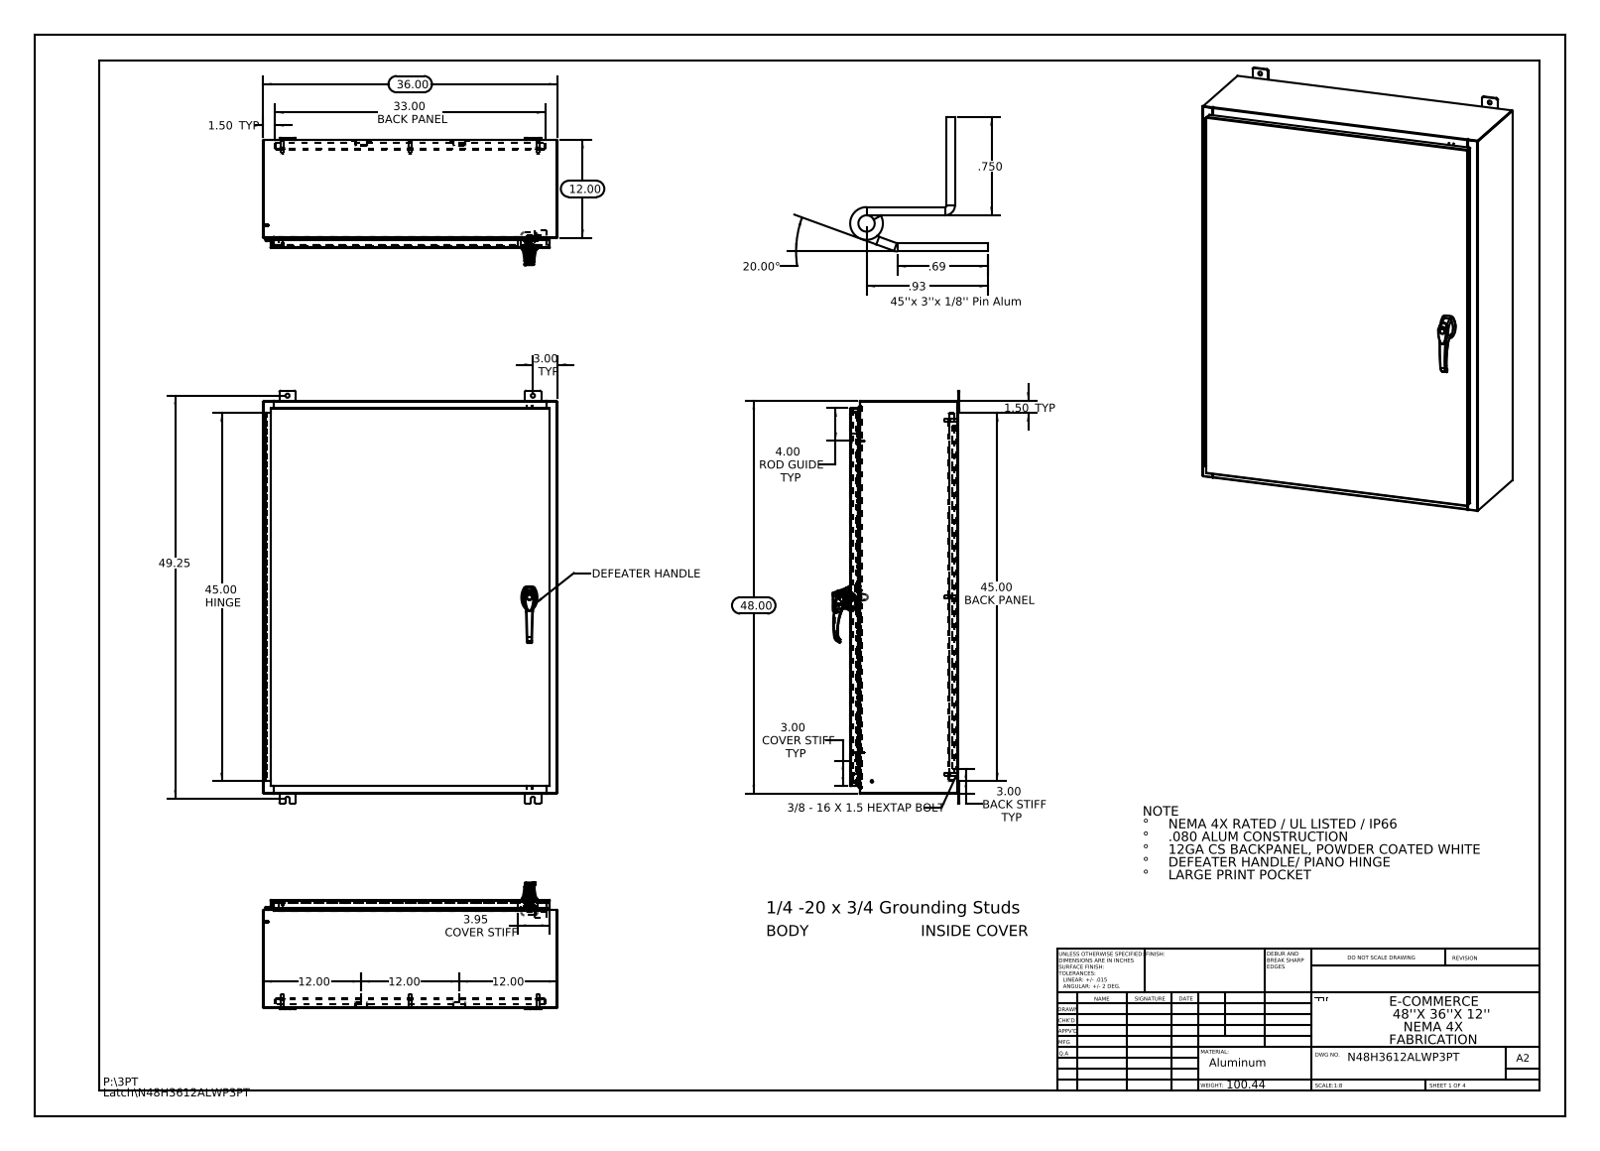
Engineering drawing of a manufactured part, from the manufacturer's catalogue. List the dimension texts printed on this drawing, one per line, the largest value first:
49.25
48.00
45.00 HINGE
45.00 BACK PANEL
36.00
33.00 BACK PANEL
20.00°
12.00
12.00
12.00
12.00
4.00 ROD GUIDE TYP
3.95 COVER STIFF
3.00 TYP
3.00 BACK STIFF TYP
3.00 COVER STIFF TYP
1.50 TYP
1.50 TYP
.93
.750
.69
